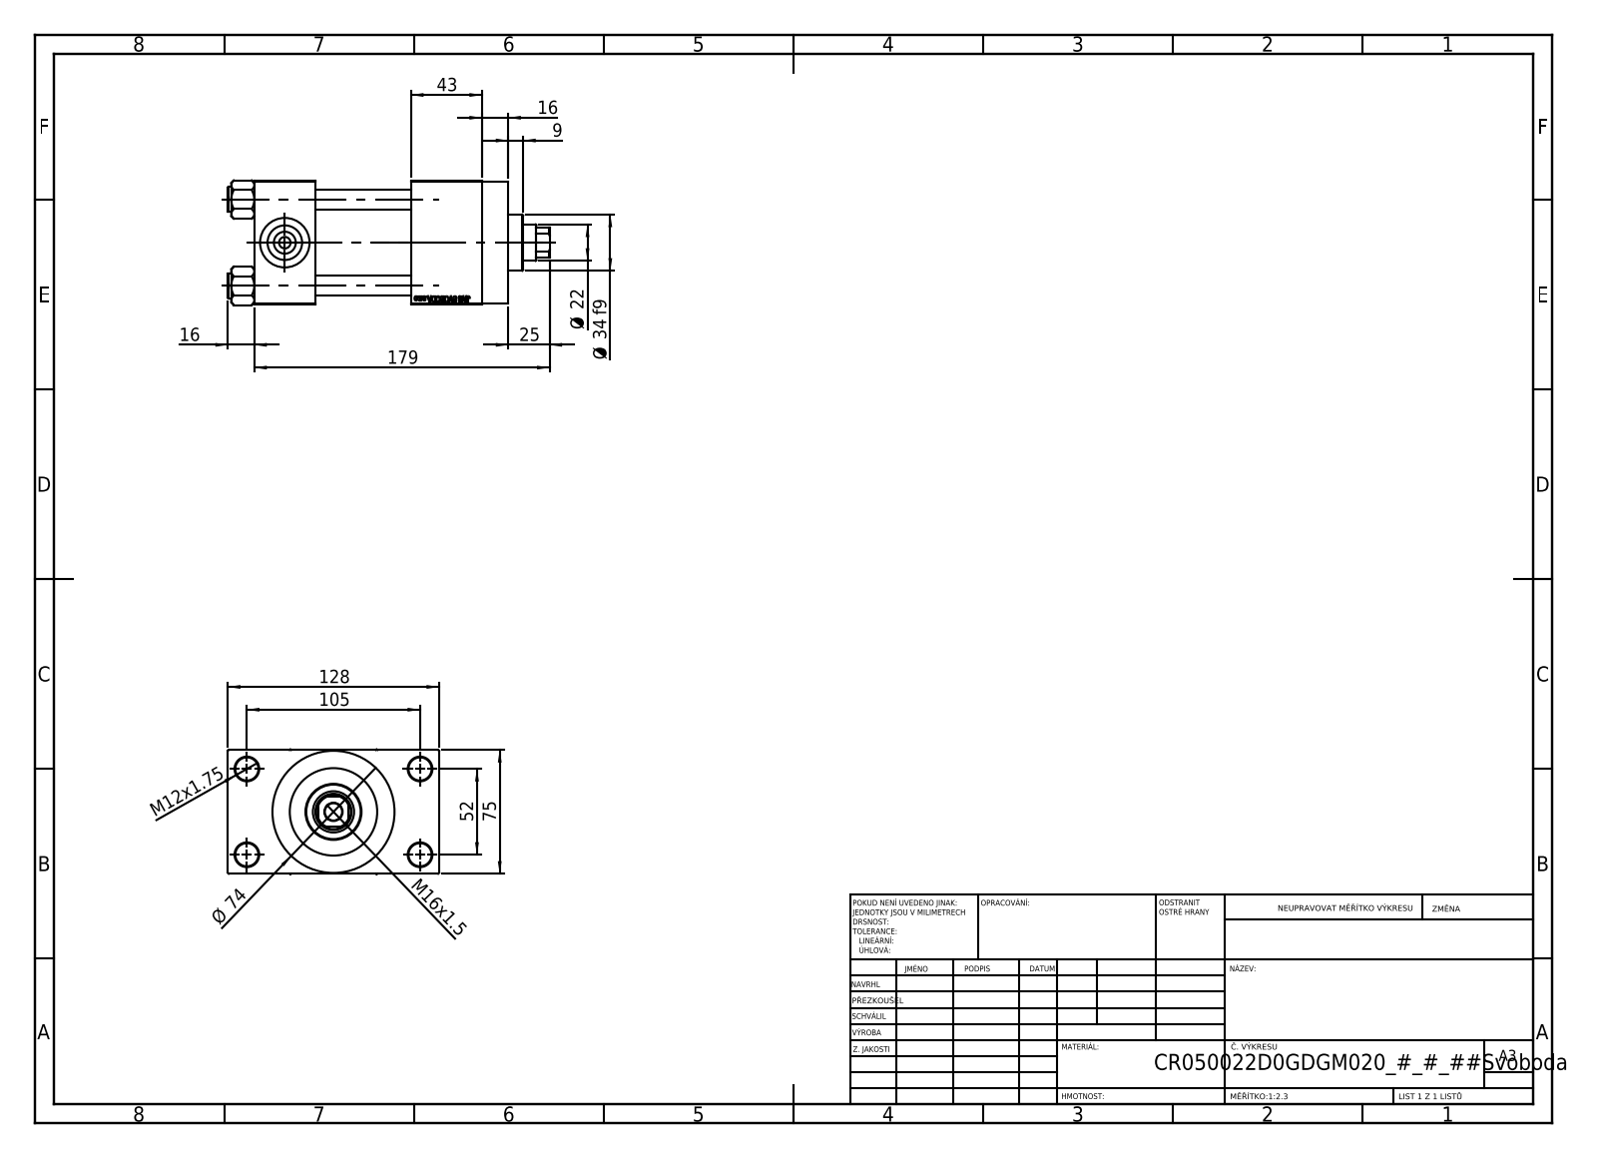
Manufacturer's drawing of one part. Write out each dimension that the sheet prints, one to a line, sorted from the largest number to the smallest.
179
128
105
75
Ø 74
52
43
Ø 34 f9
25
Ø 22
16
16
M16x1.5
M12x1.75
9
